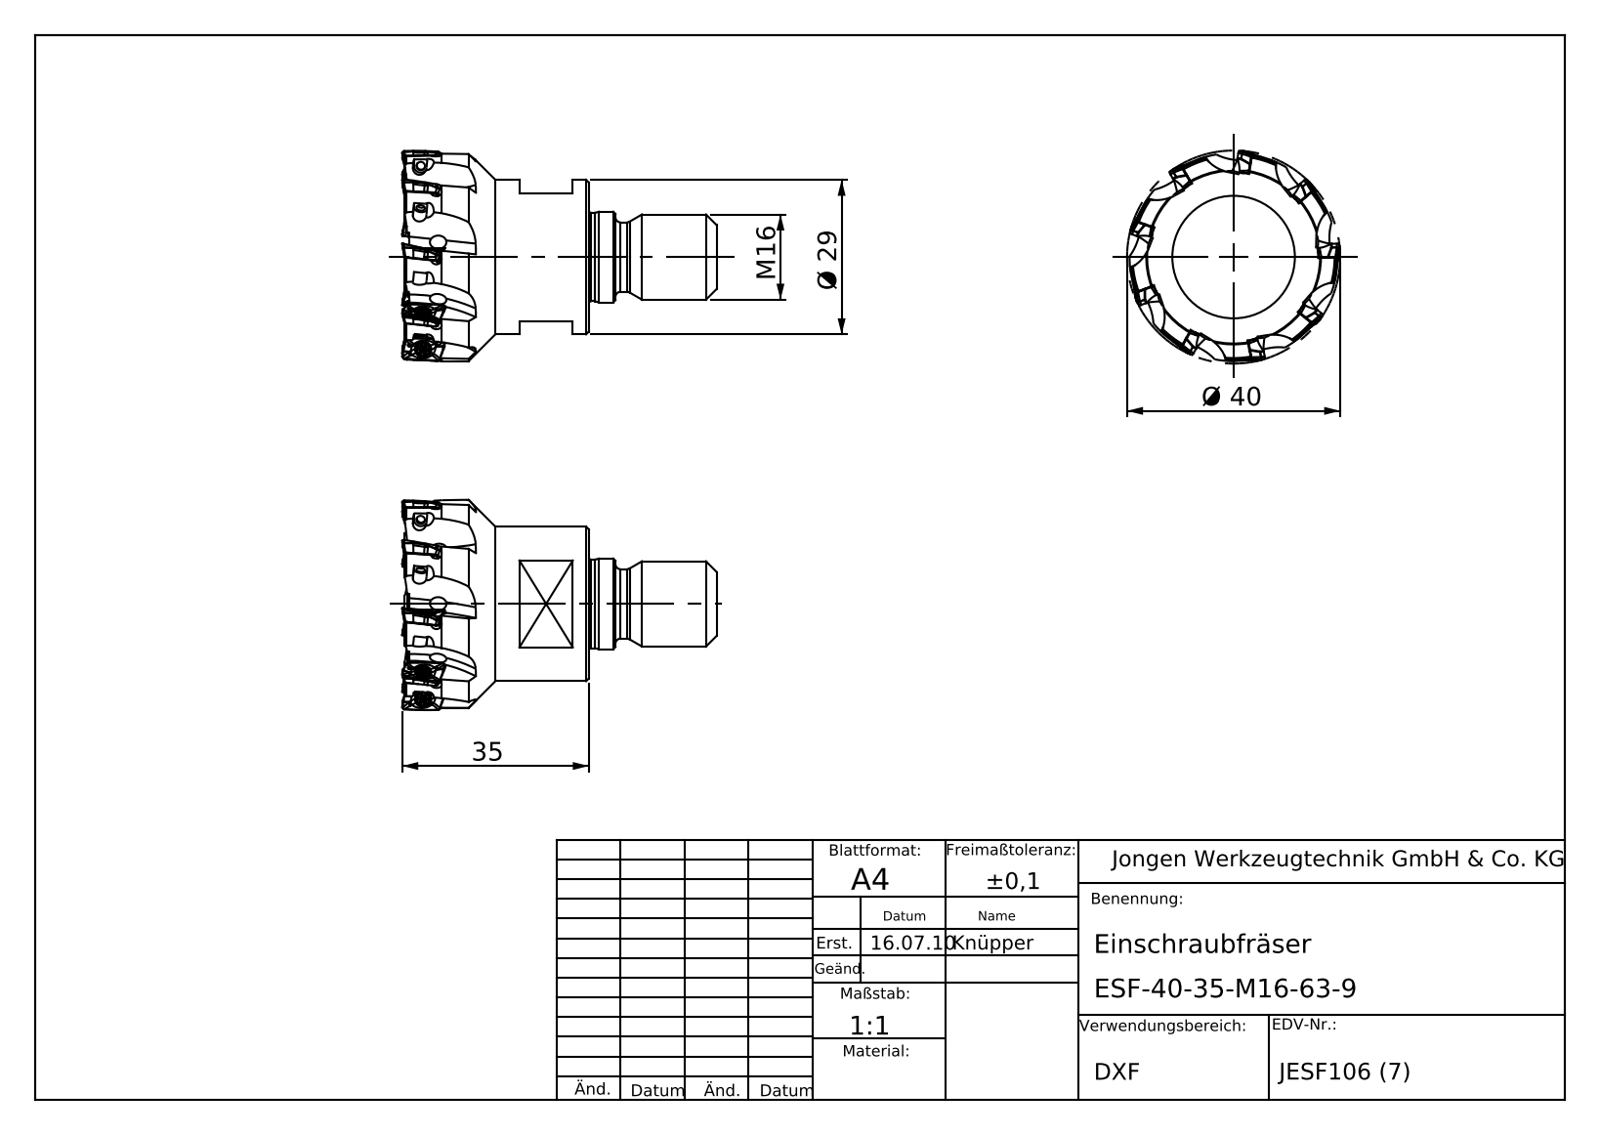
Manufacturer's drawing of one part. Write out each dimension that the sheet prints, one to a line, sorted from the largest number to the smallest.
Ø 40
35
Ø 29
M 16
